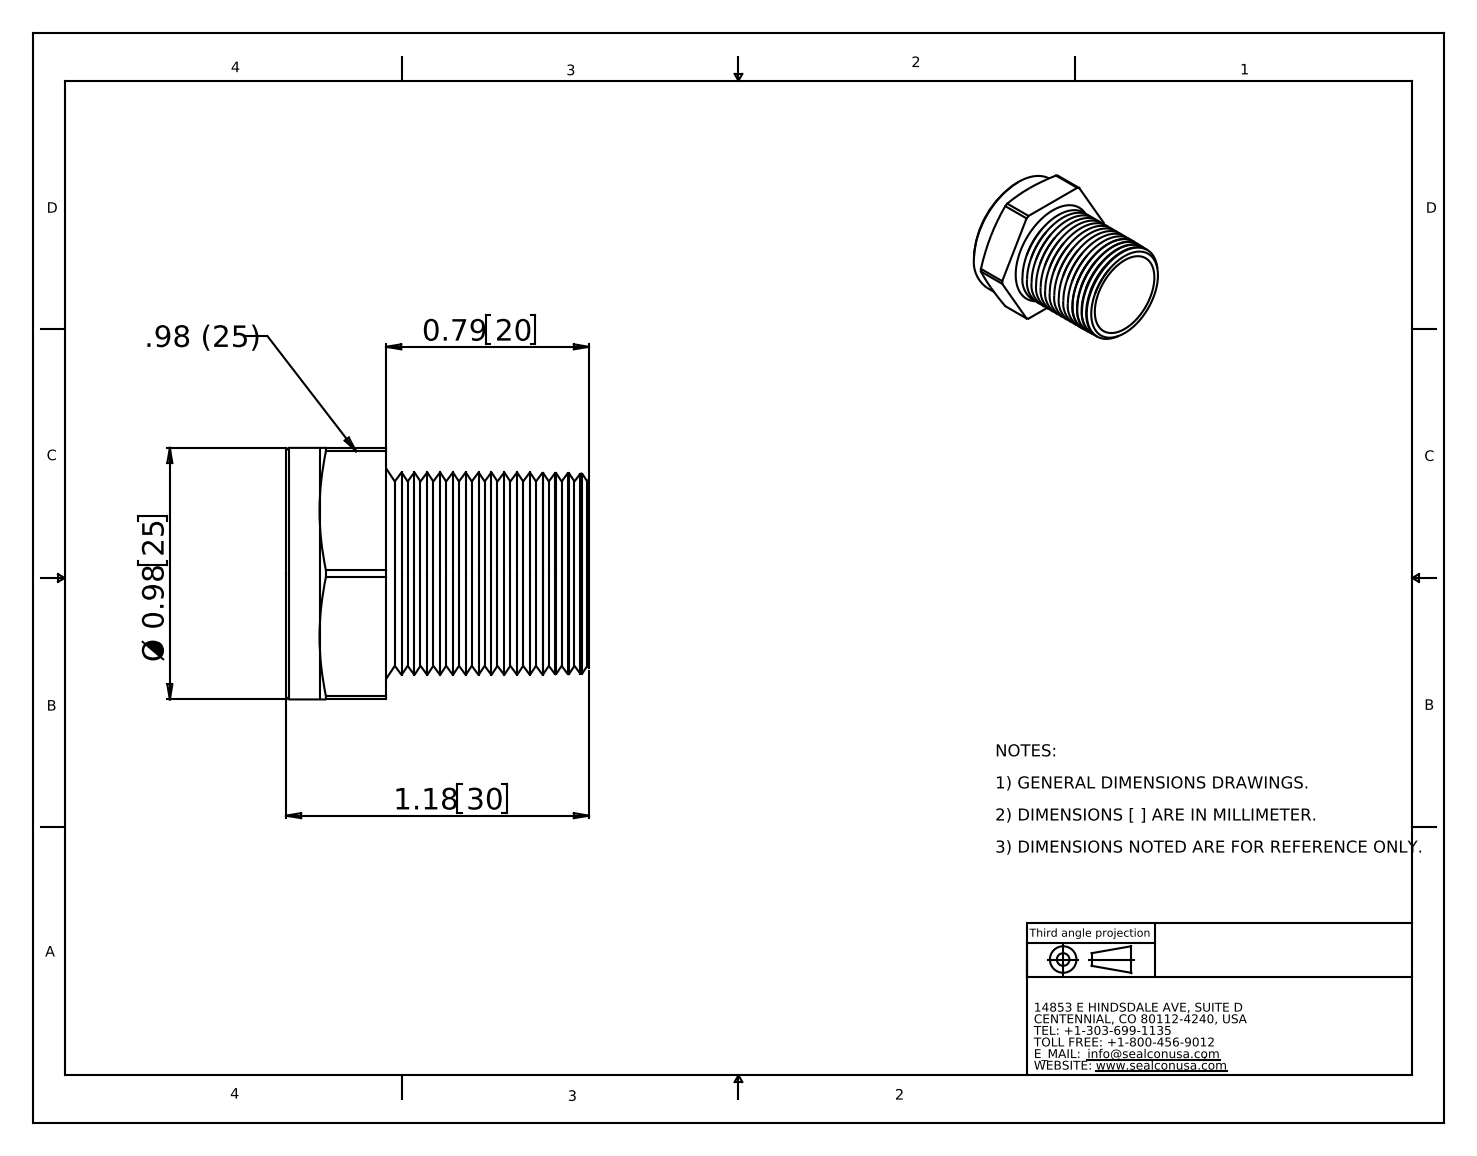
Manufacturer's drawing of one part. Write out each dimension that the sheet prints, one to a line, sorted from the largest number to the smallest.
1.18 30
Ø 0.98 25
0.79 20
